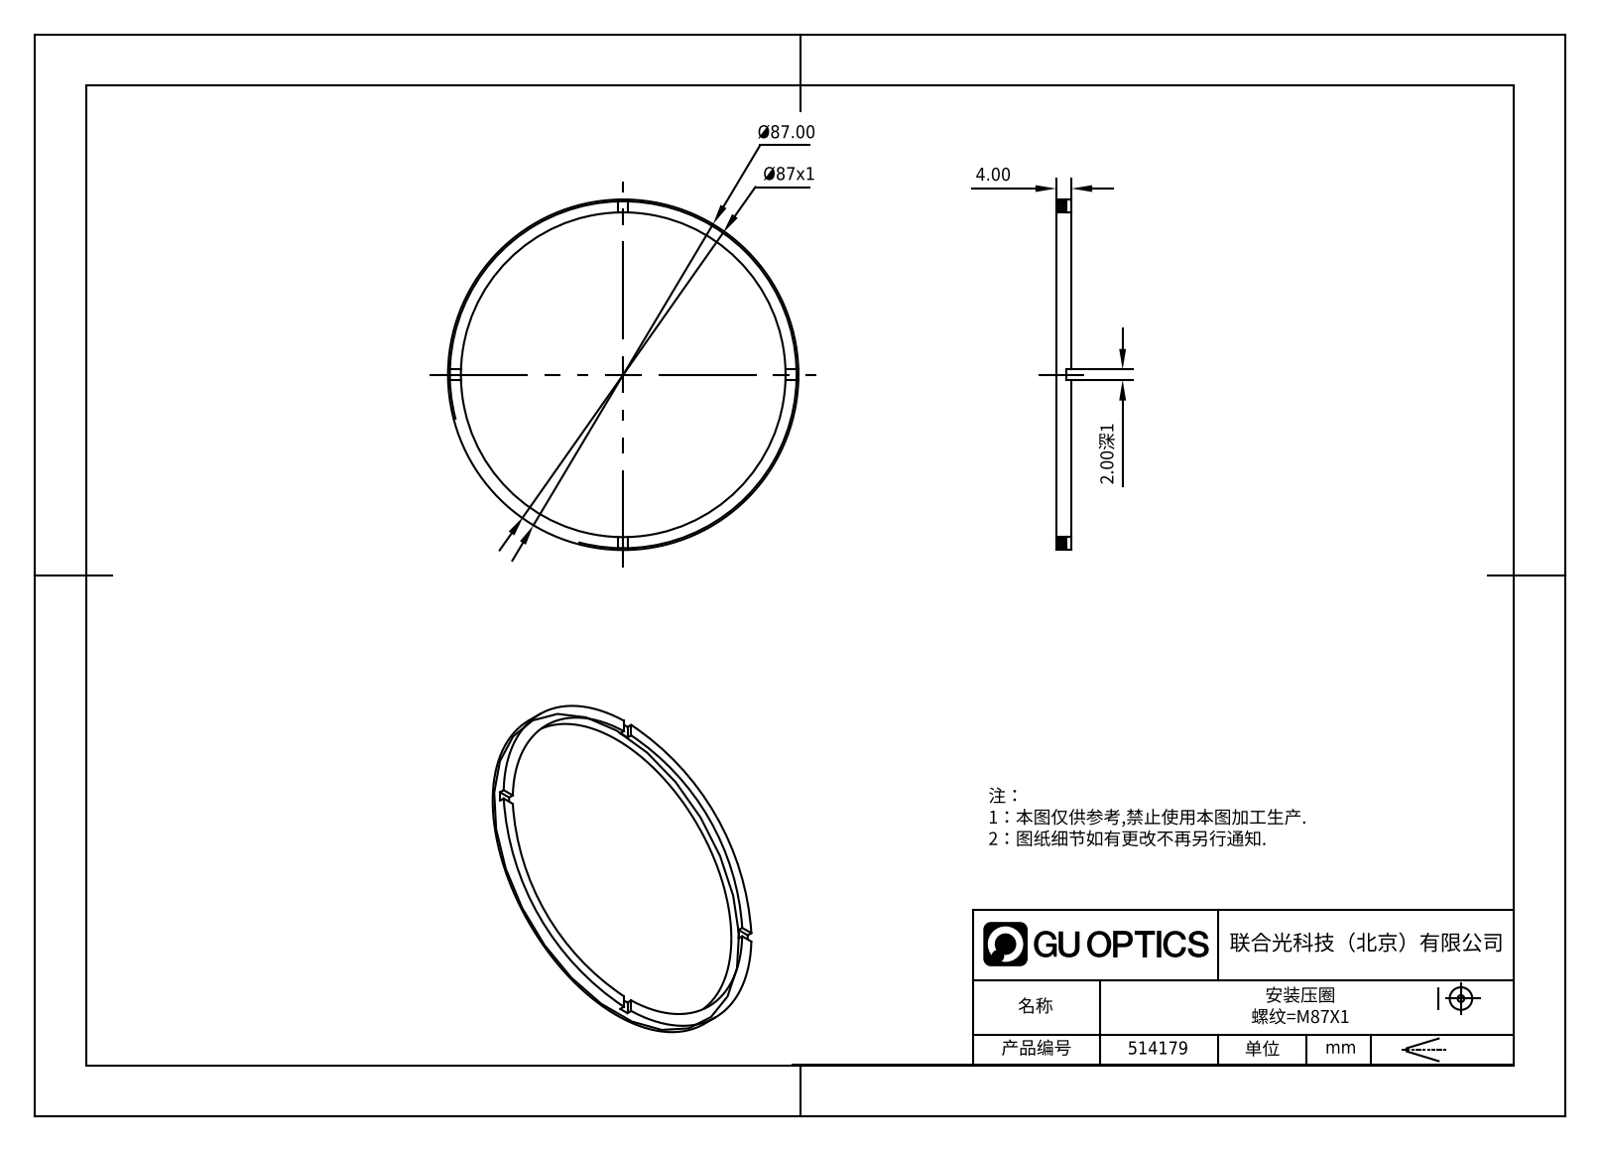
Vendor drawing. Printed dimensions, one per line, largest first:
Ø87.00
Ø87x1
4.00
2.00深1
